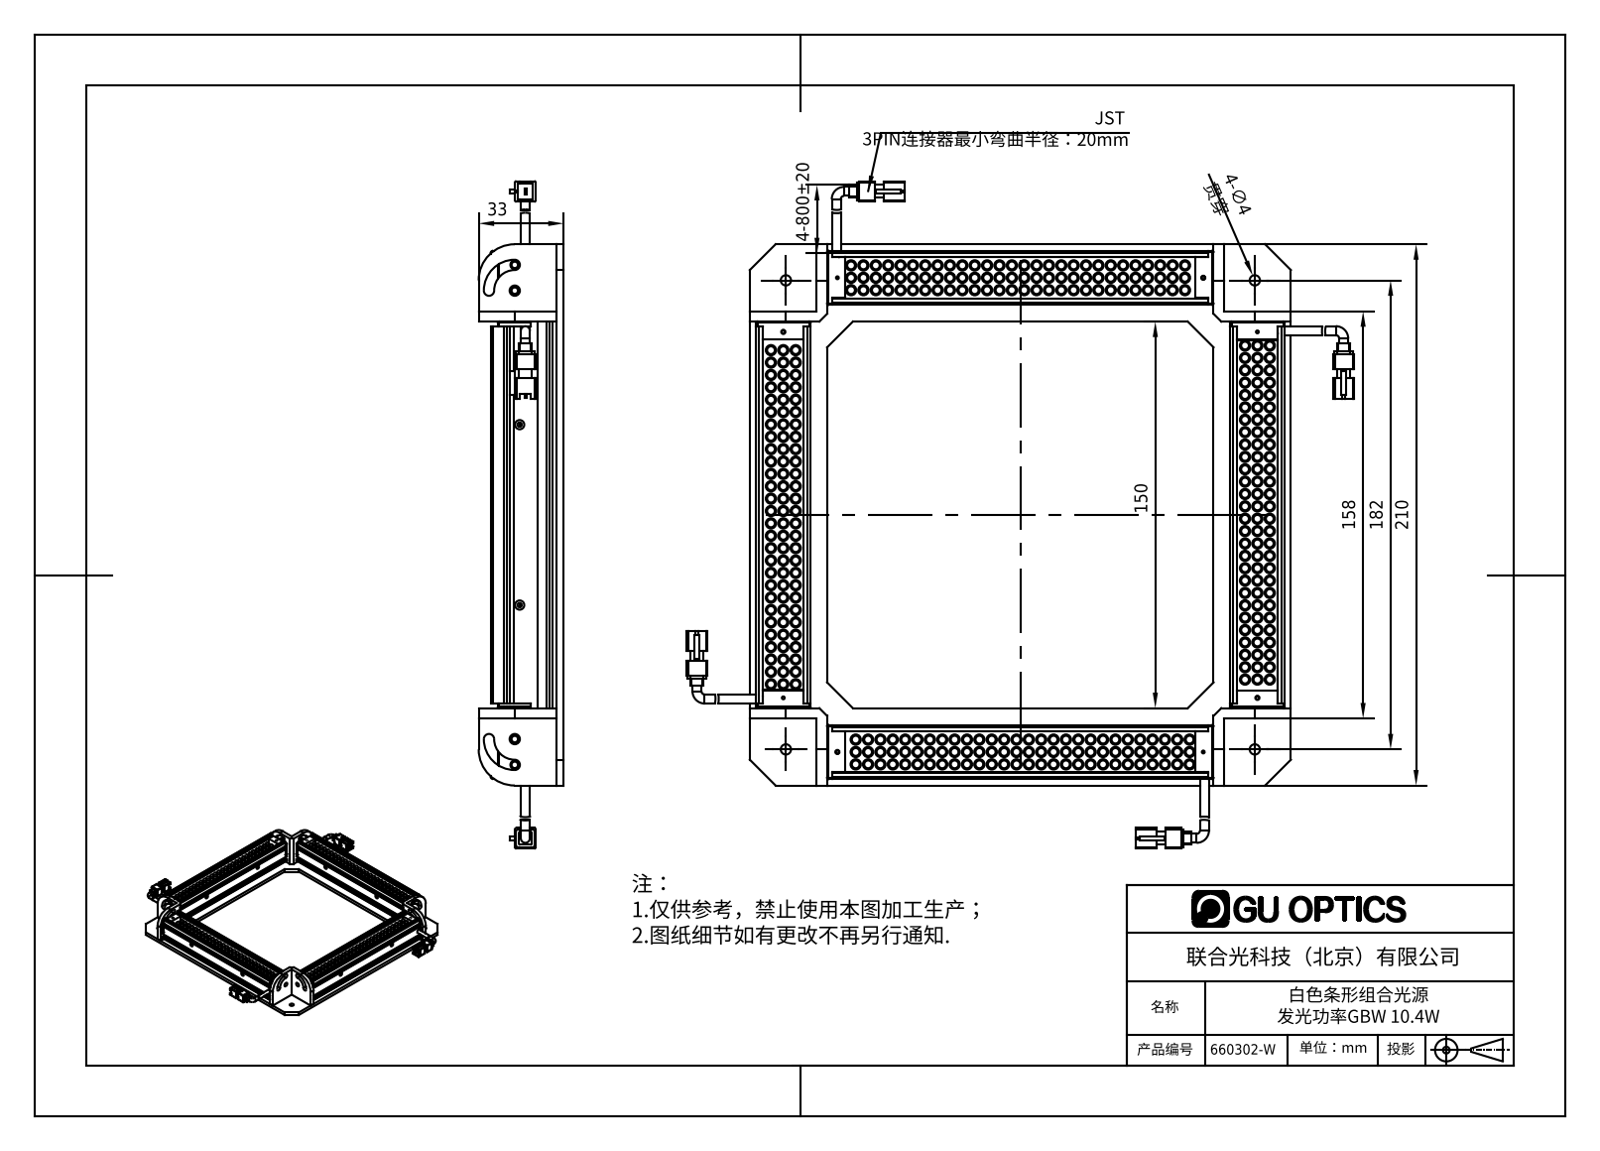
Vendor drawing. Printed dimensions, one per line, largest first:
210
182
158
150
33
4-800±20
4-∅4 贯穿
